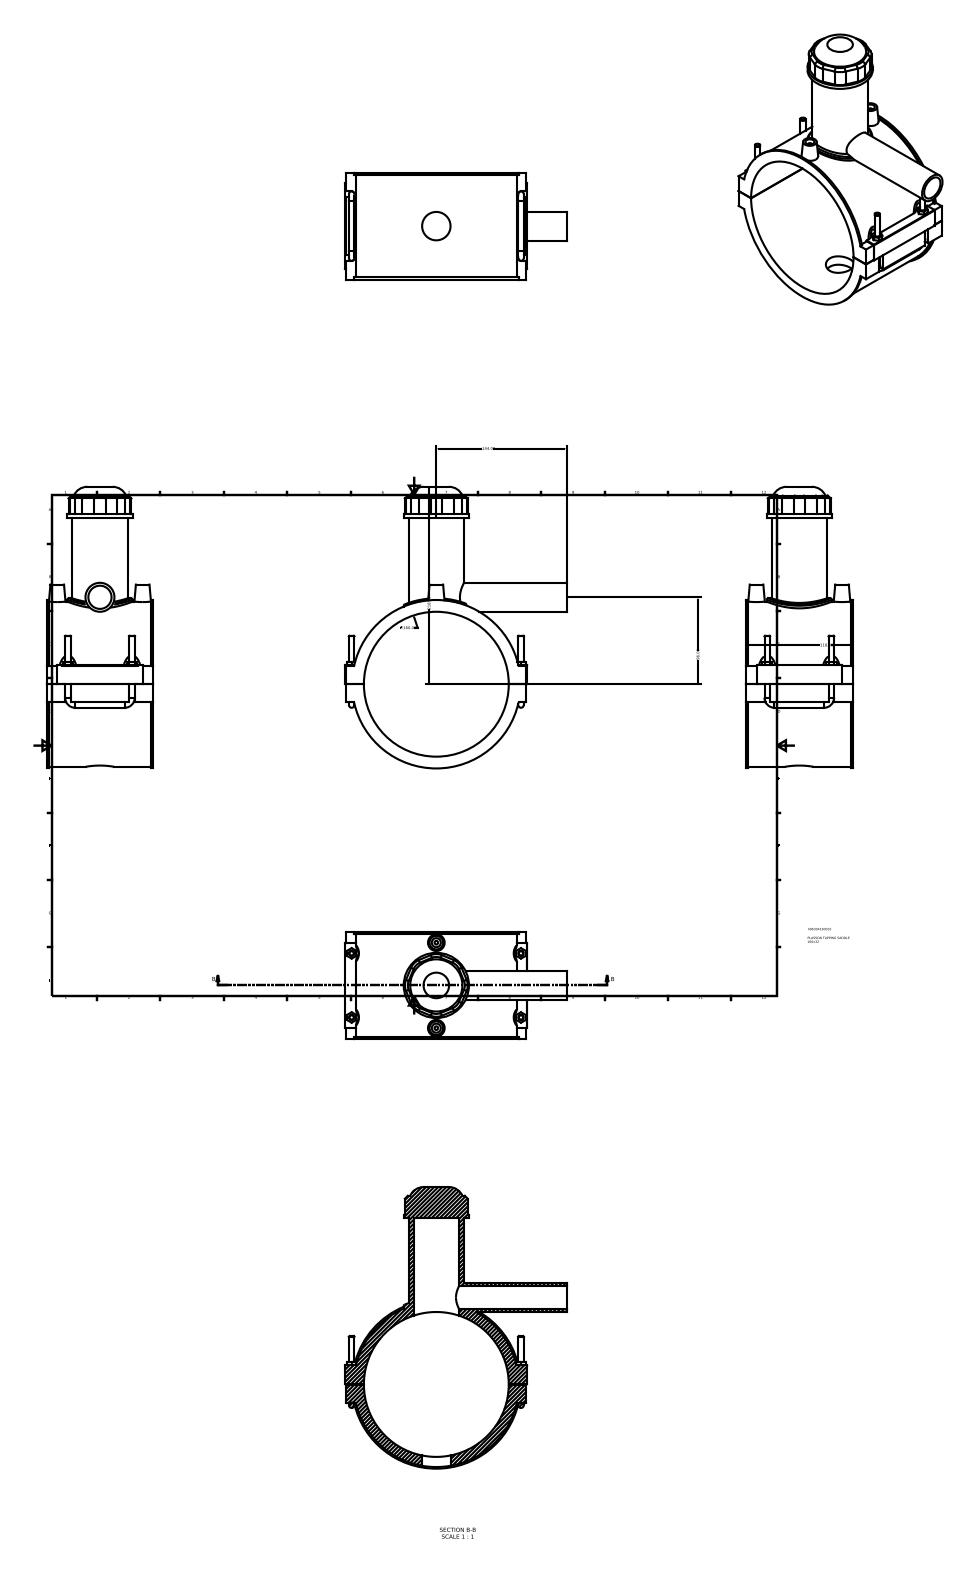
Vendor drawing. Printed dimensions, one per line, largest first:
218.00
∅160.00
144.00
118.00
96.00
